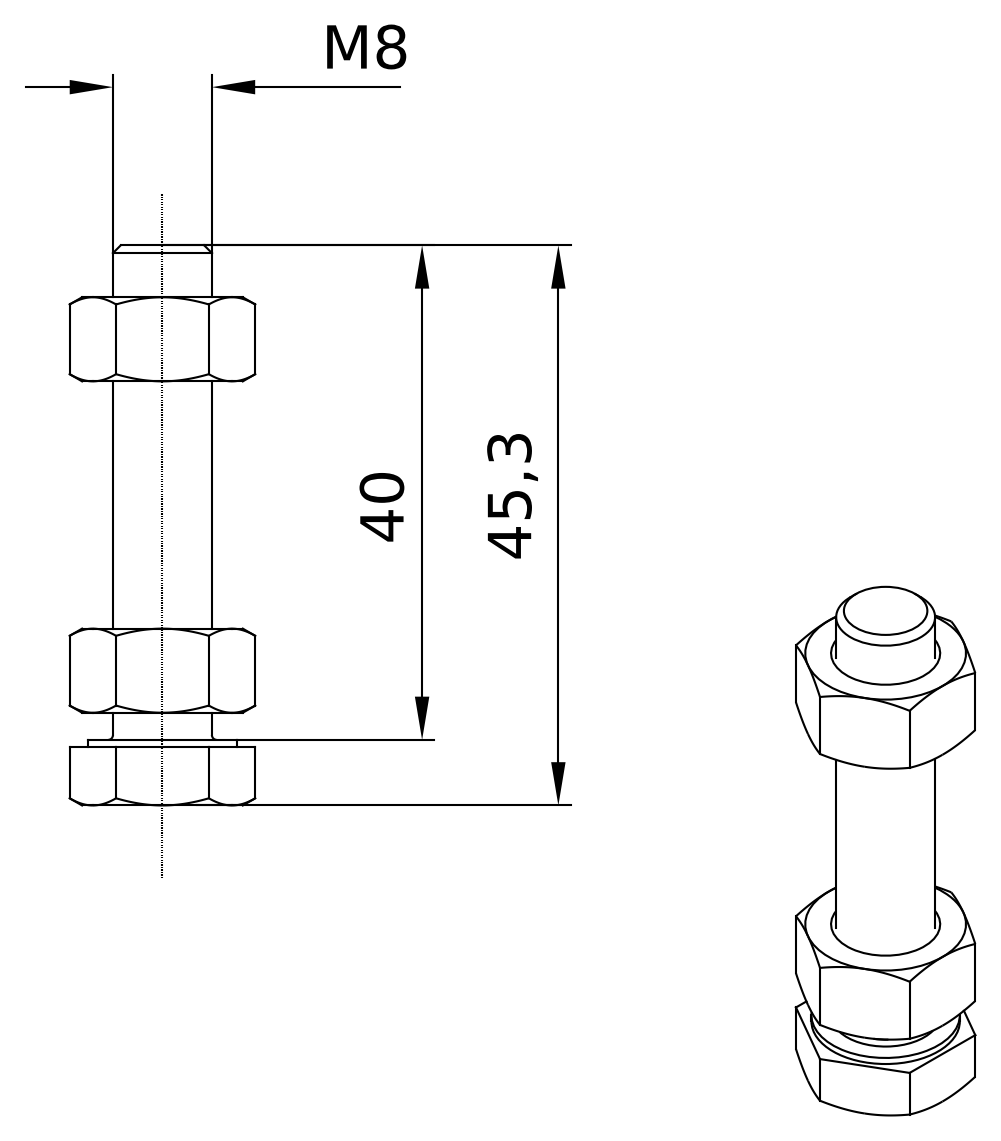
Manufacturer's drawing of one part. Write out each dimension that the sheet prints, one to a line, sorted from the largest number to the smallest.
45,3
40
M8
